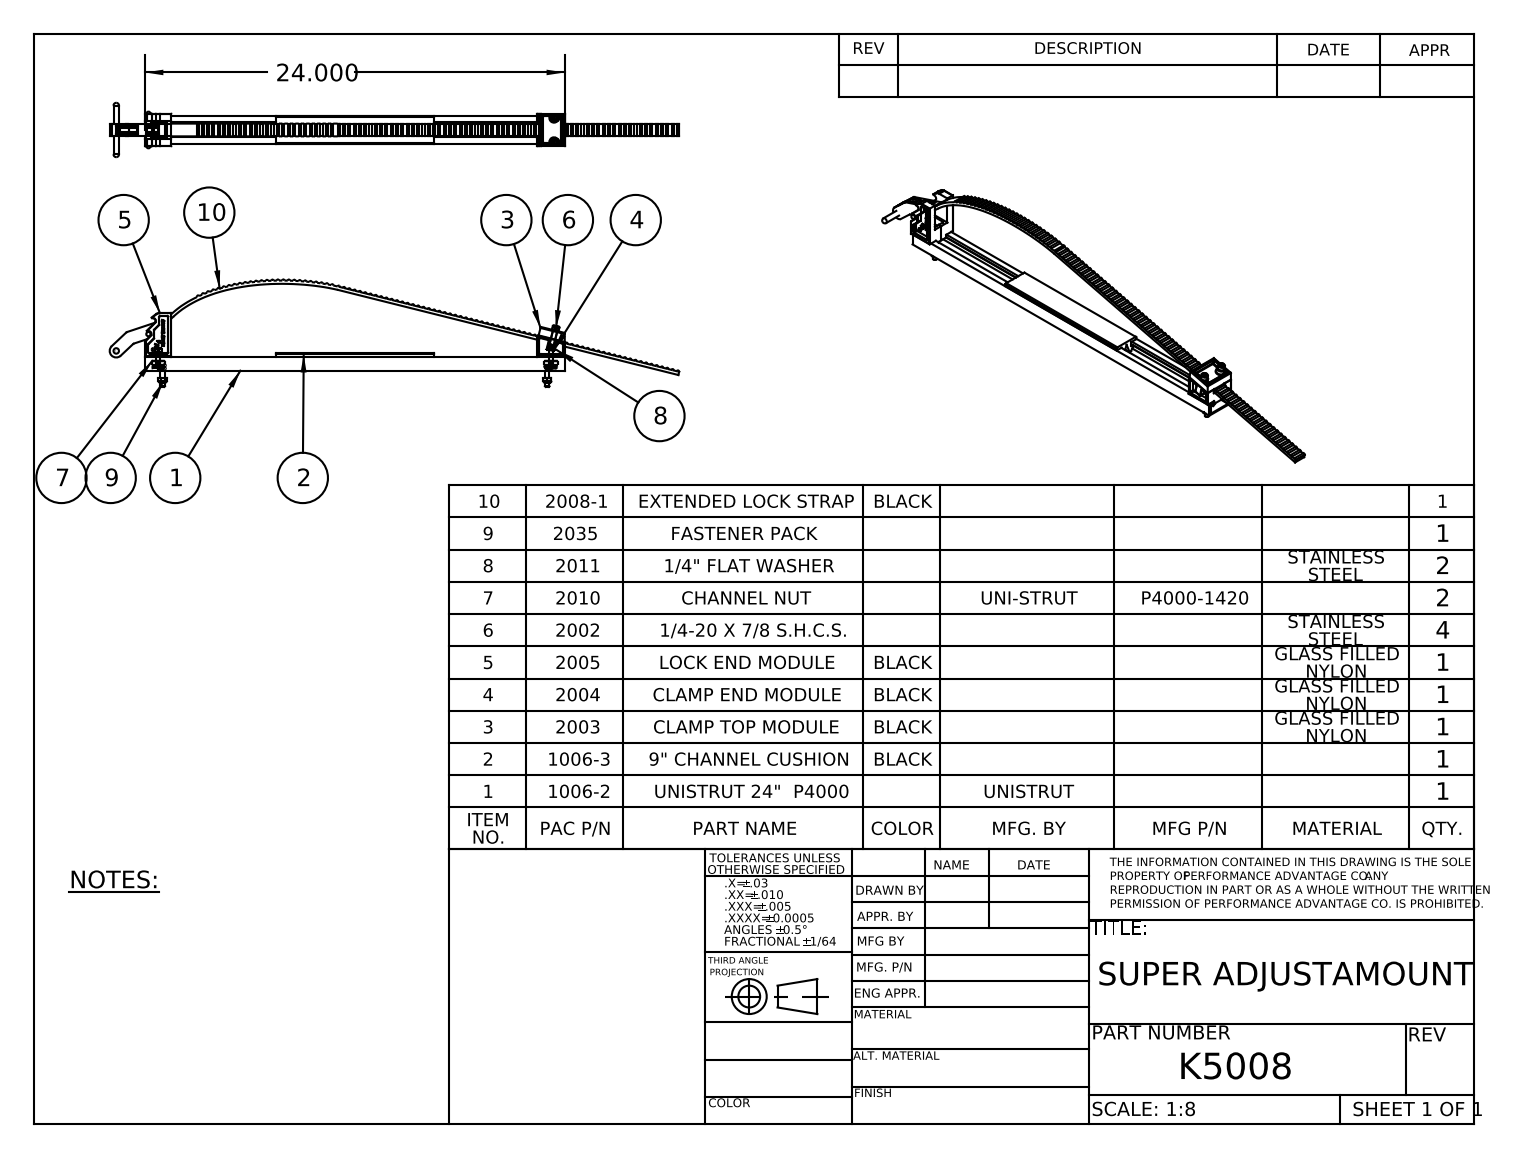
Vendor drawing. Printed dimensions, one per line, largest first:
24.000
